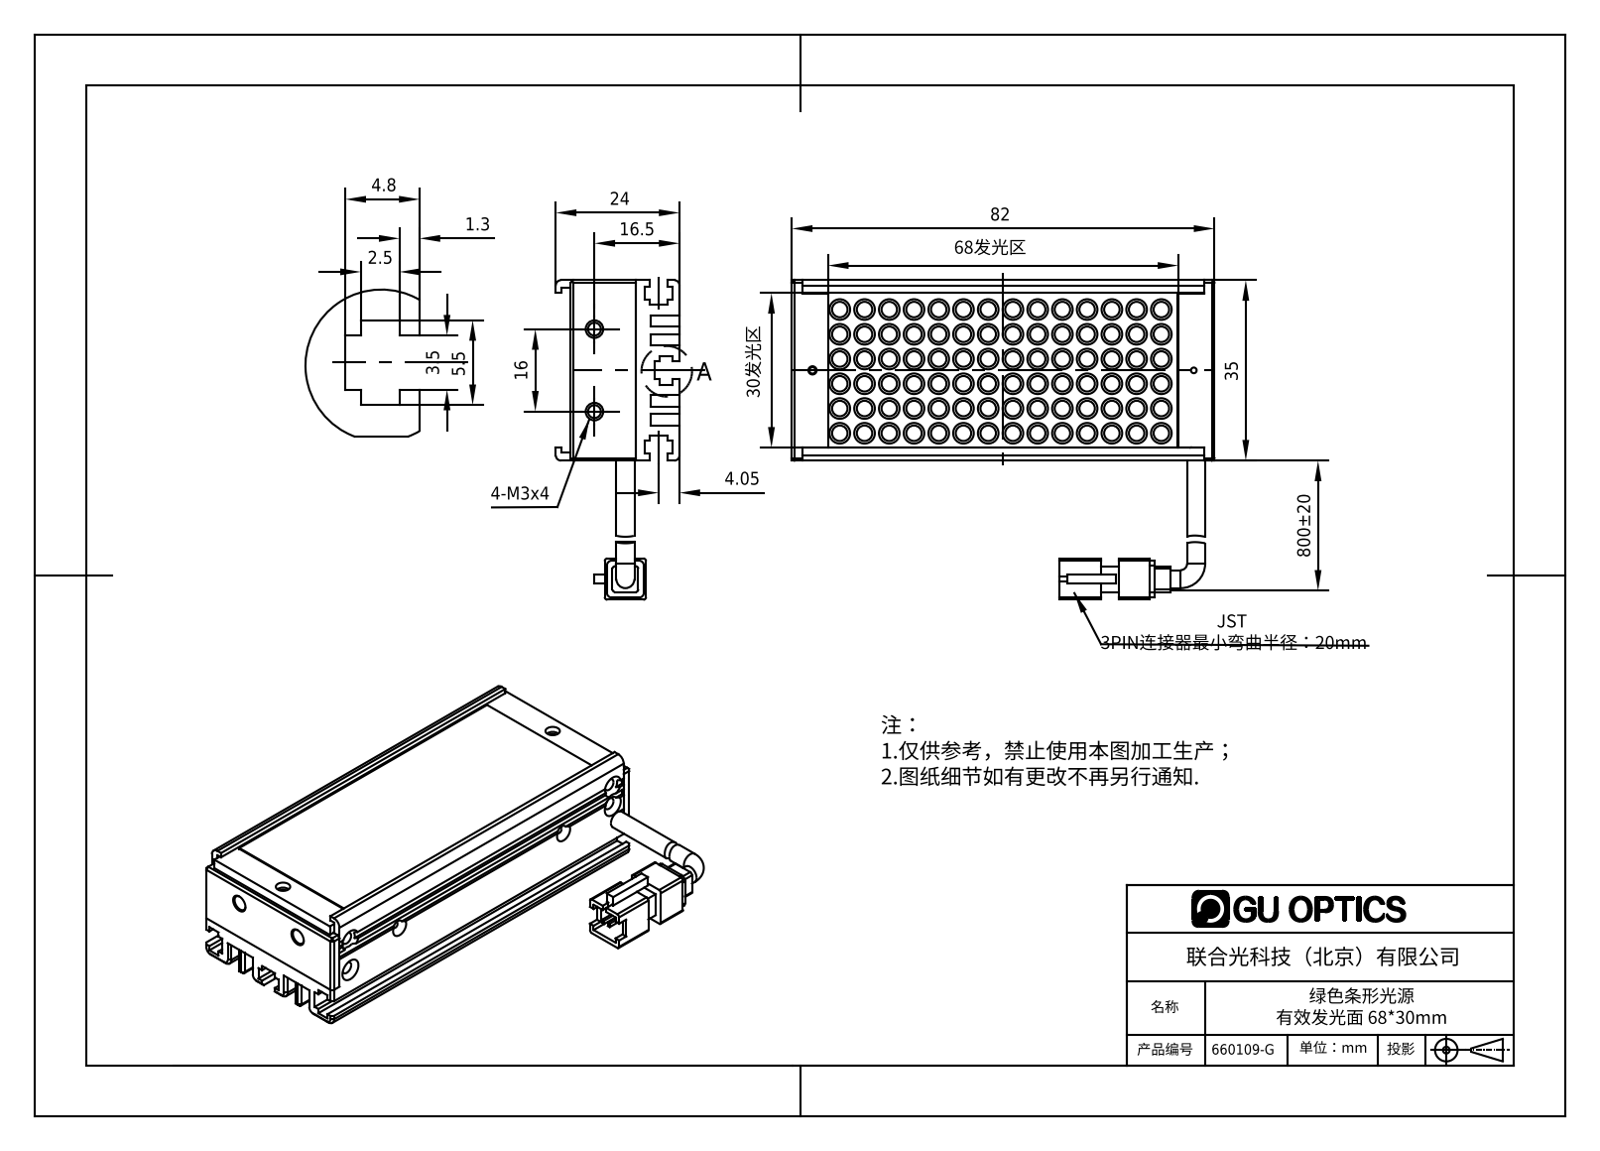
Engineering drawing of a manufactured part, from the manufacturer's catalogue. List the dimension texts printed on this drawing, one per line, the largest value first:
800±20
82
68发光区
35
30发光区
24
16.5
16
5.5
4.8
4.05
3.5
2.5
1.3
